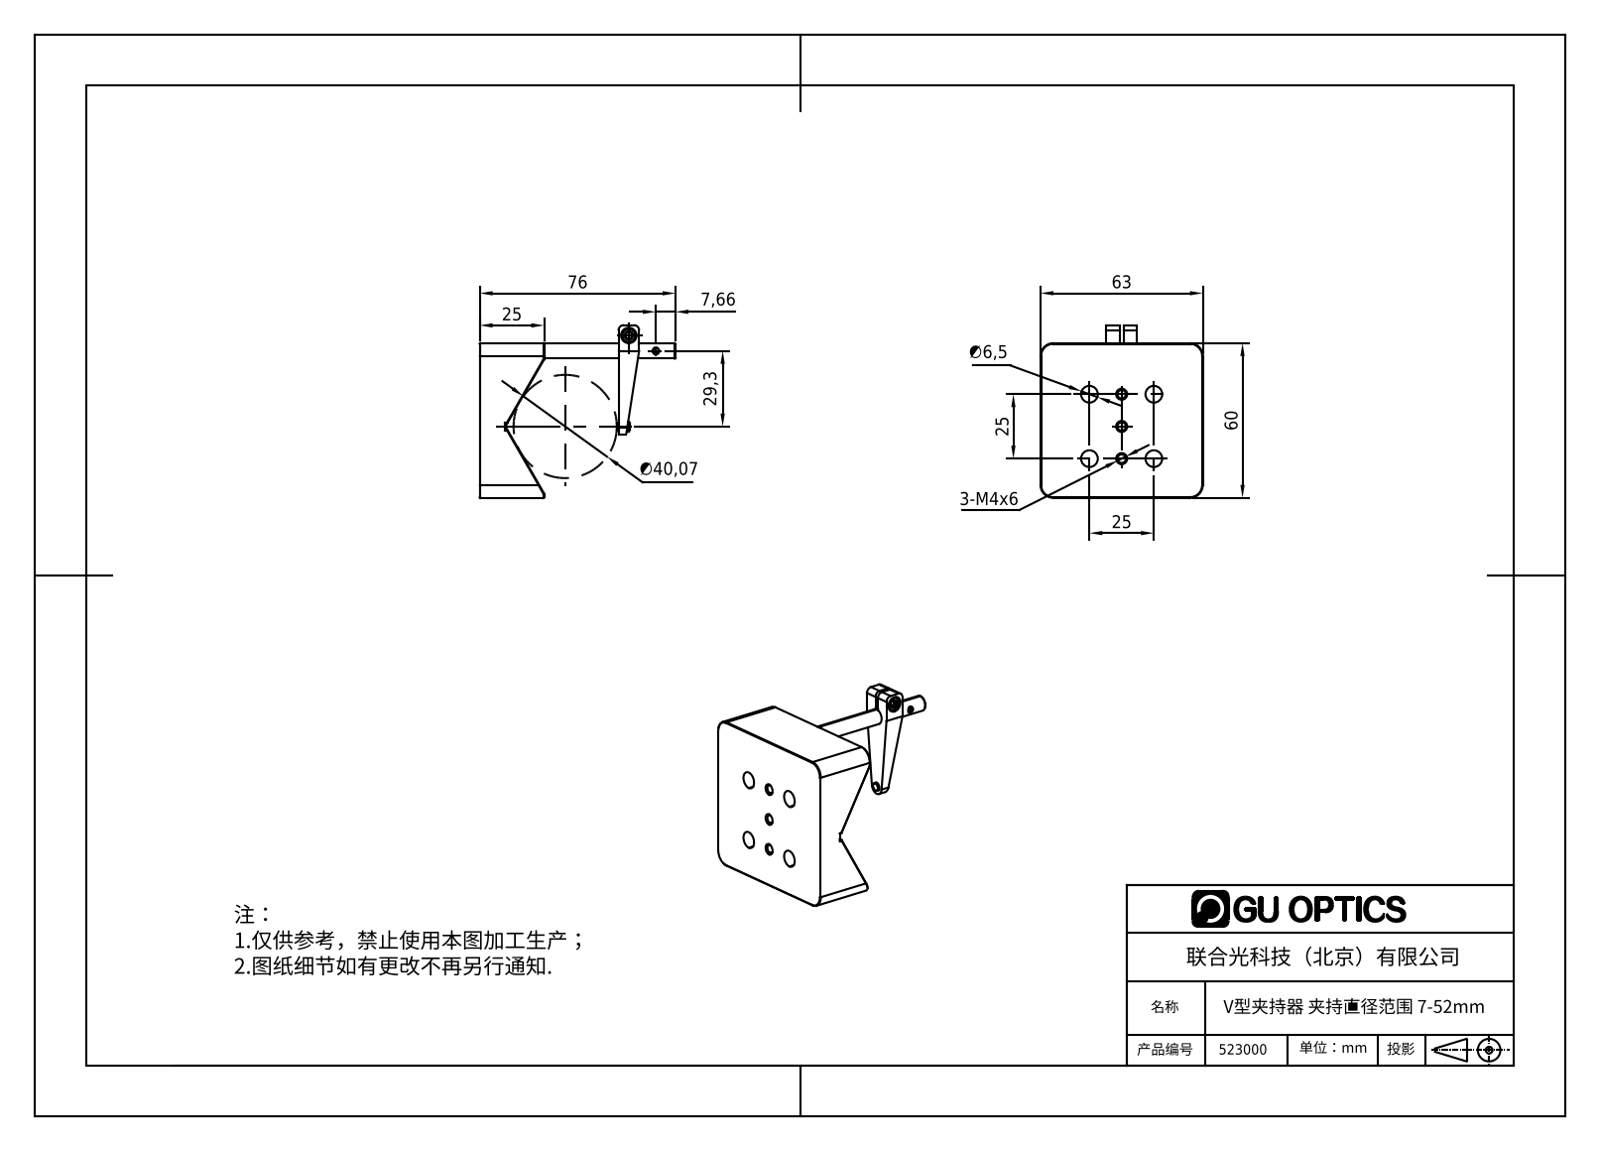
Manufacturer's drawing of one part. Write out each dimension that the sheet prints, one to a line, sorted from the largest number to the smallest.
76
63
60
∅40,07
29,3
25
25
25
7,66
∅6,5
3-M4x6
